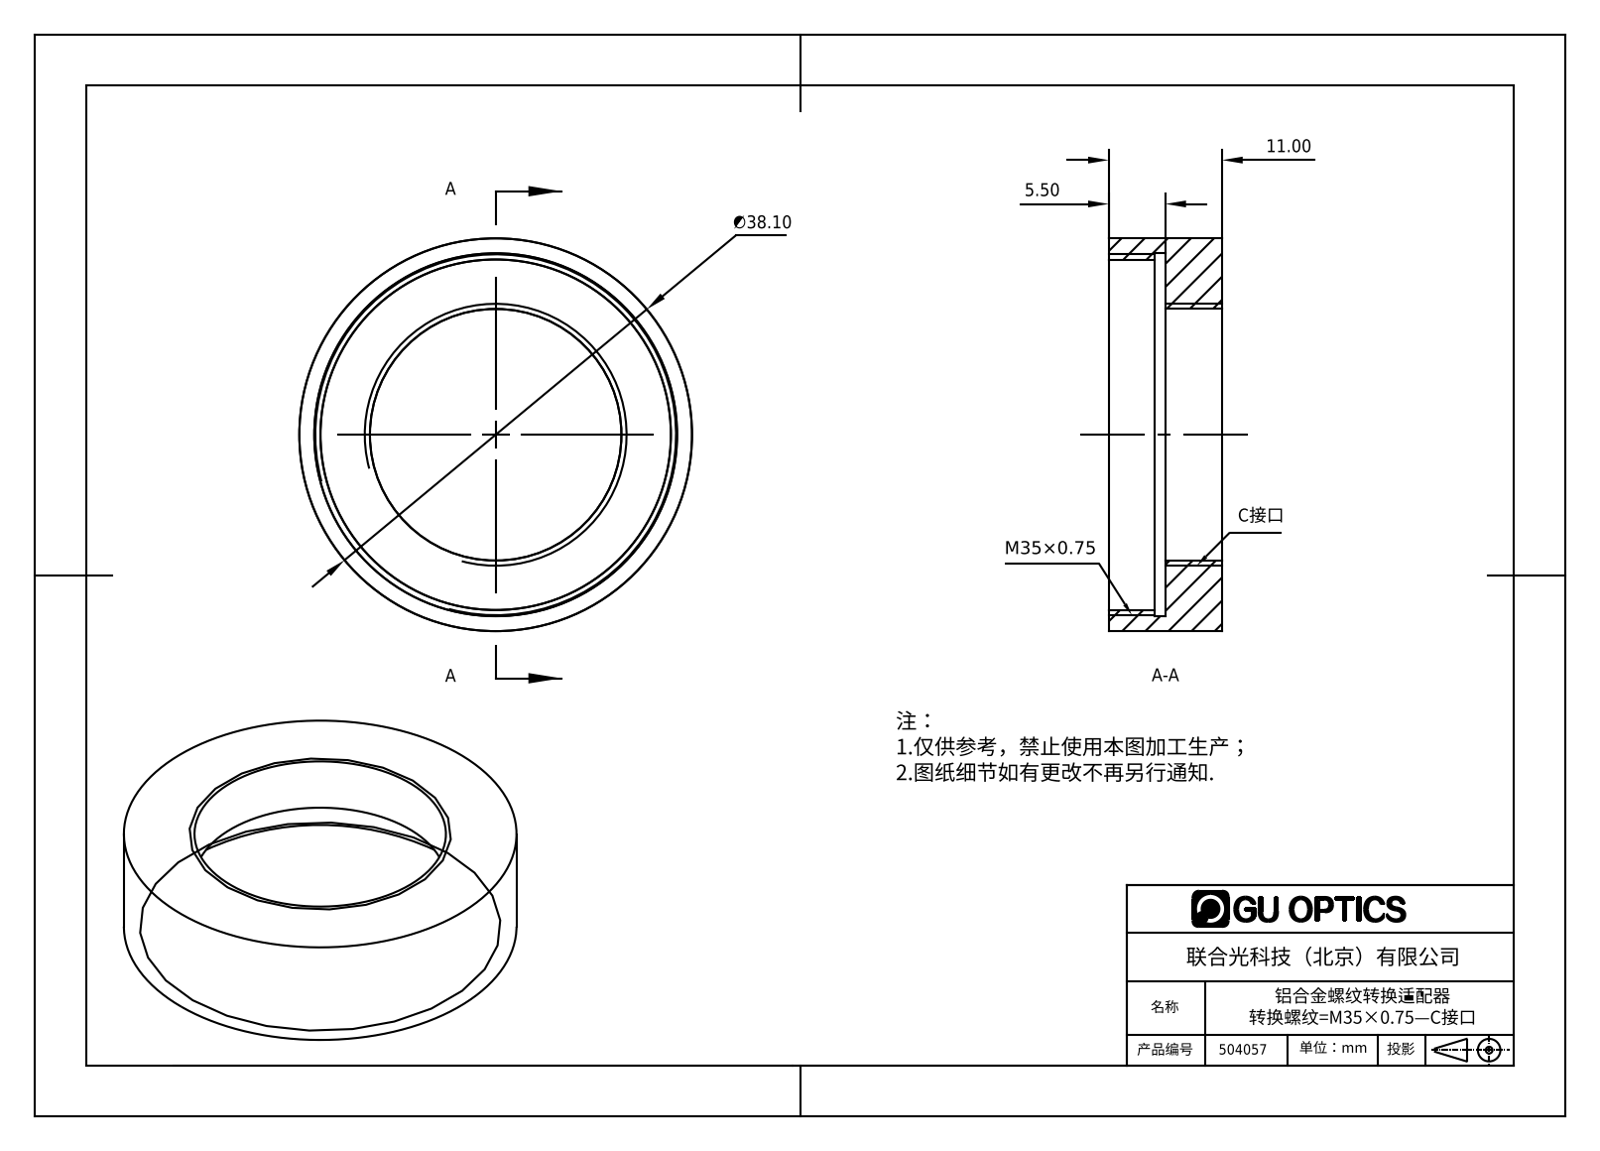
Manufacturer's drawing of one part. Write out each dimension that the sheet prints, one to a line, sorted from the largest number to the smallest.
∅38.10
11.00
5.50
